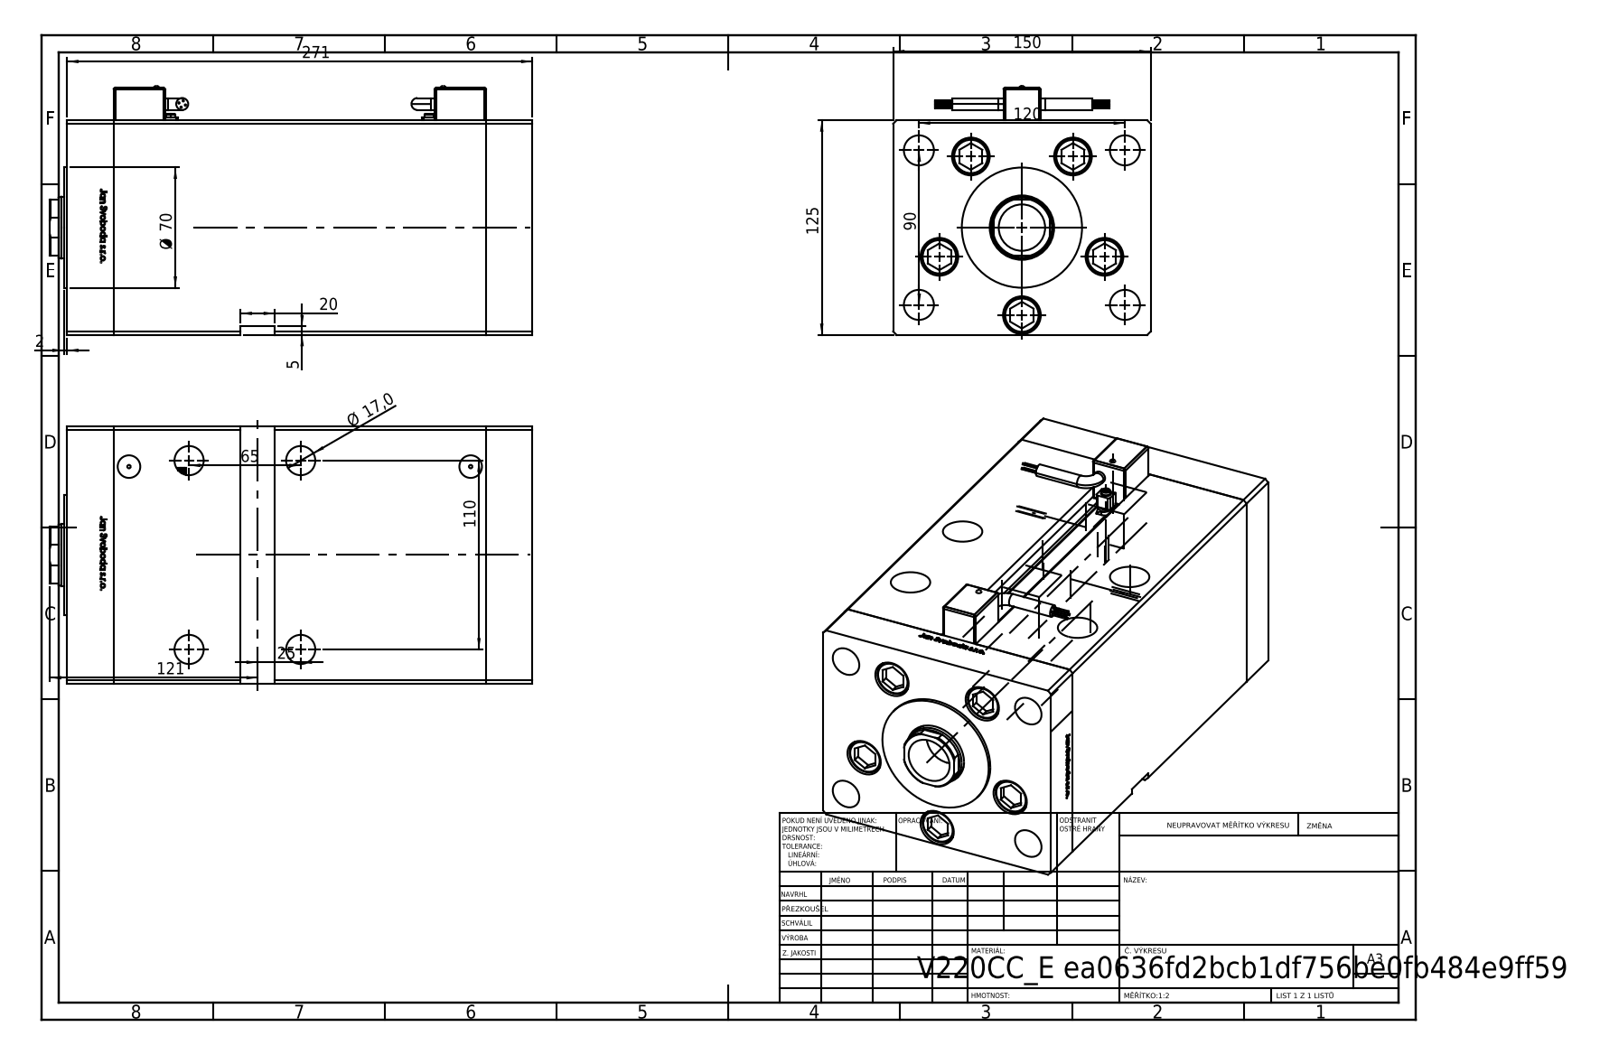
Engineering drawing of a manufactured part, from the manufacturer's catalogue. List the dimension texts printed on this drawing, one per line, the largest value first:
271
150
125
121
120
110
90
Ø 70
65
25
20
Ø 17,0
5
2
